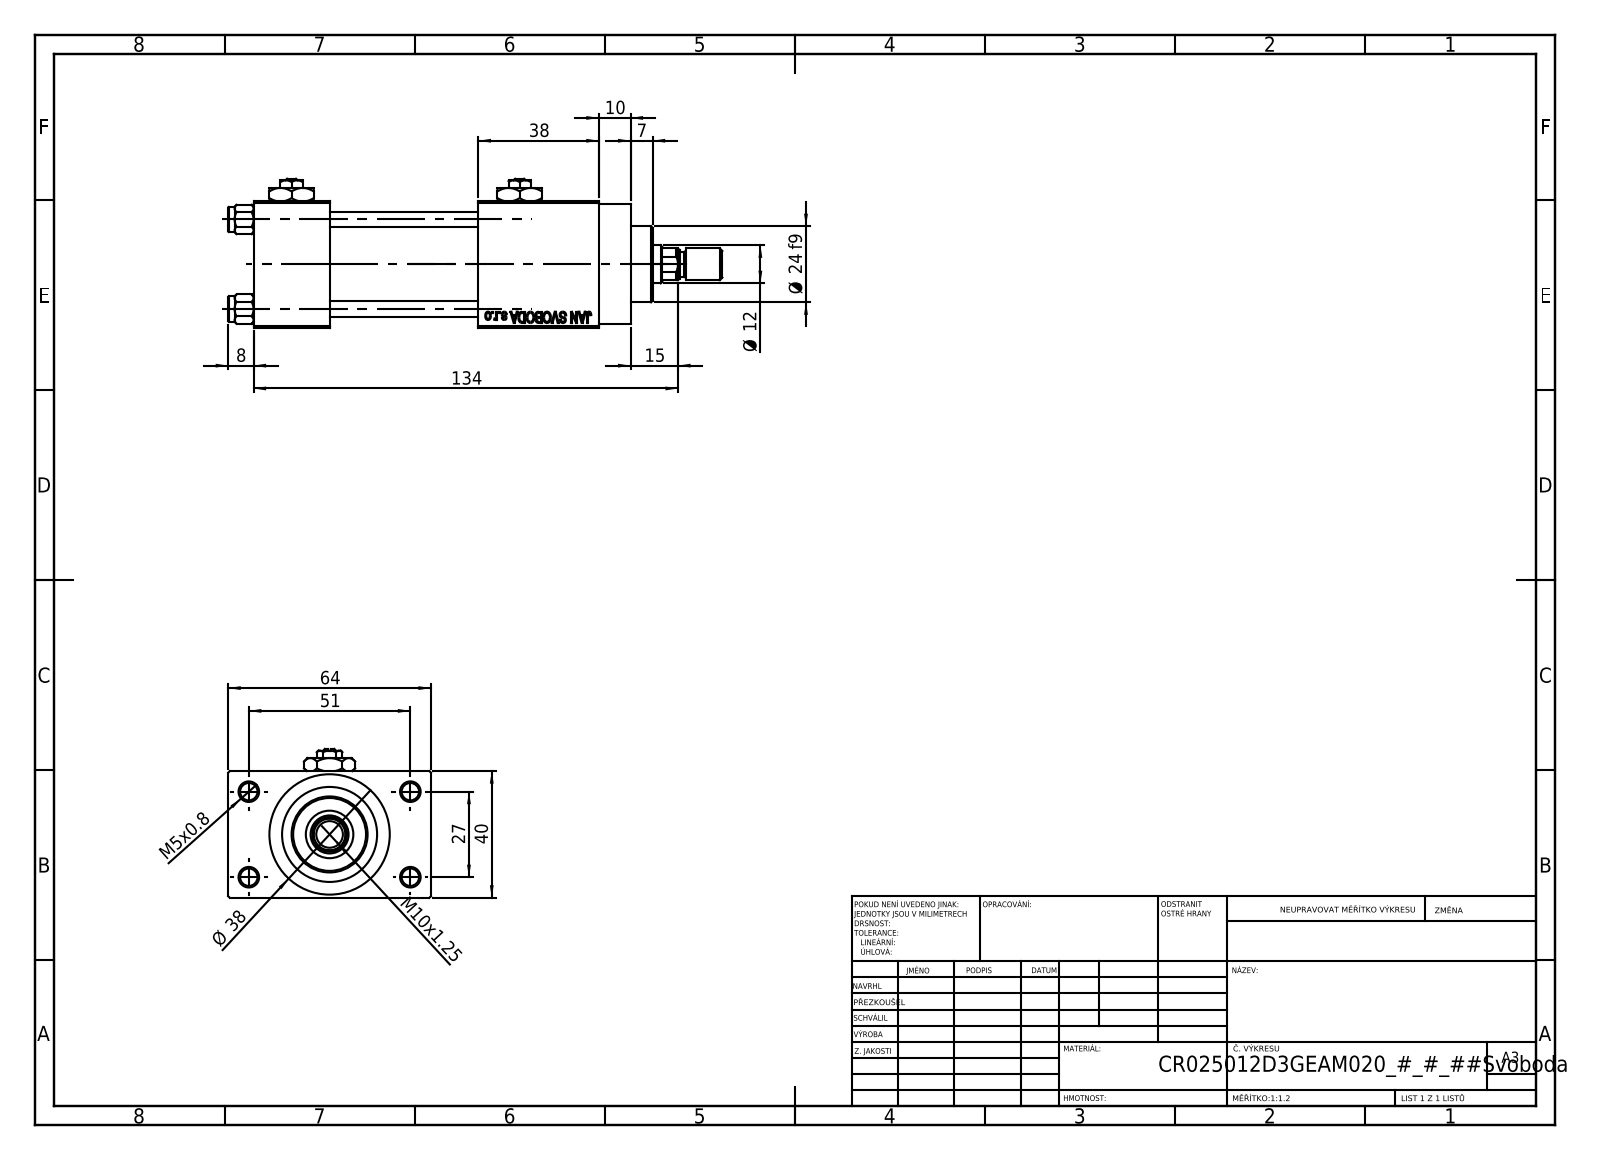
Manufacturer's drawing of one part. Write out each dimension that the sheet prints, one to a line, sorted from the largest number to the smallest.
134
64
51
40
38
Ø 38
27
Ø 24 f9
15
Ø 12
10
M10x1.25
8
7
M5x0.8
